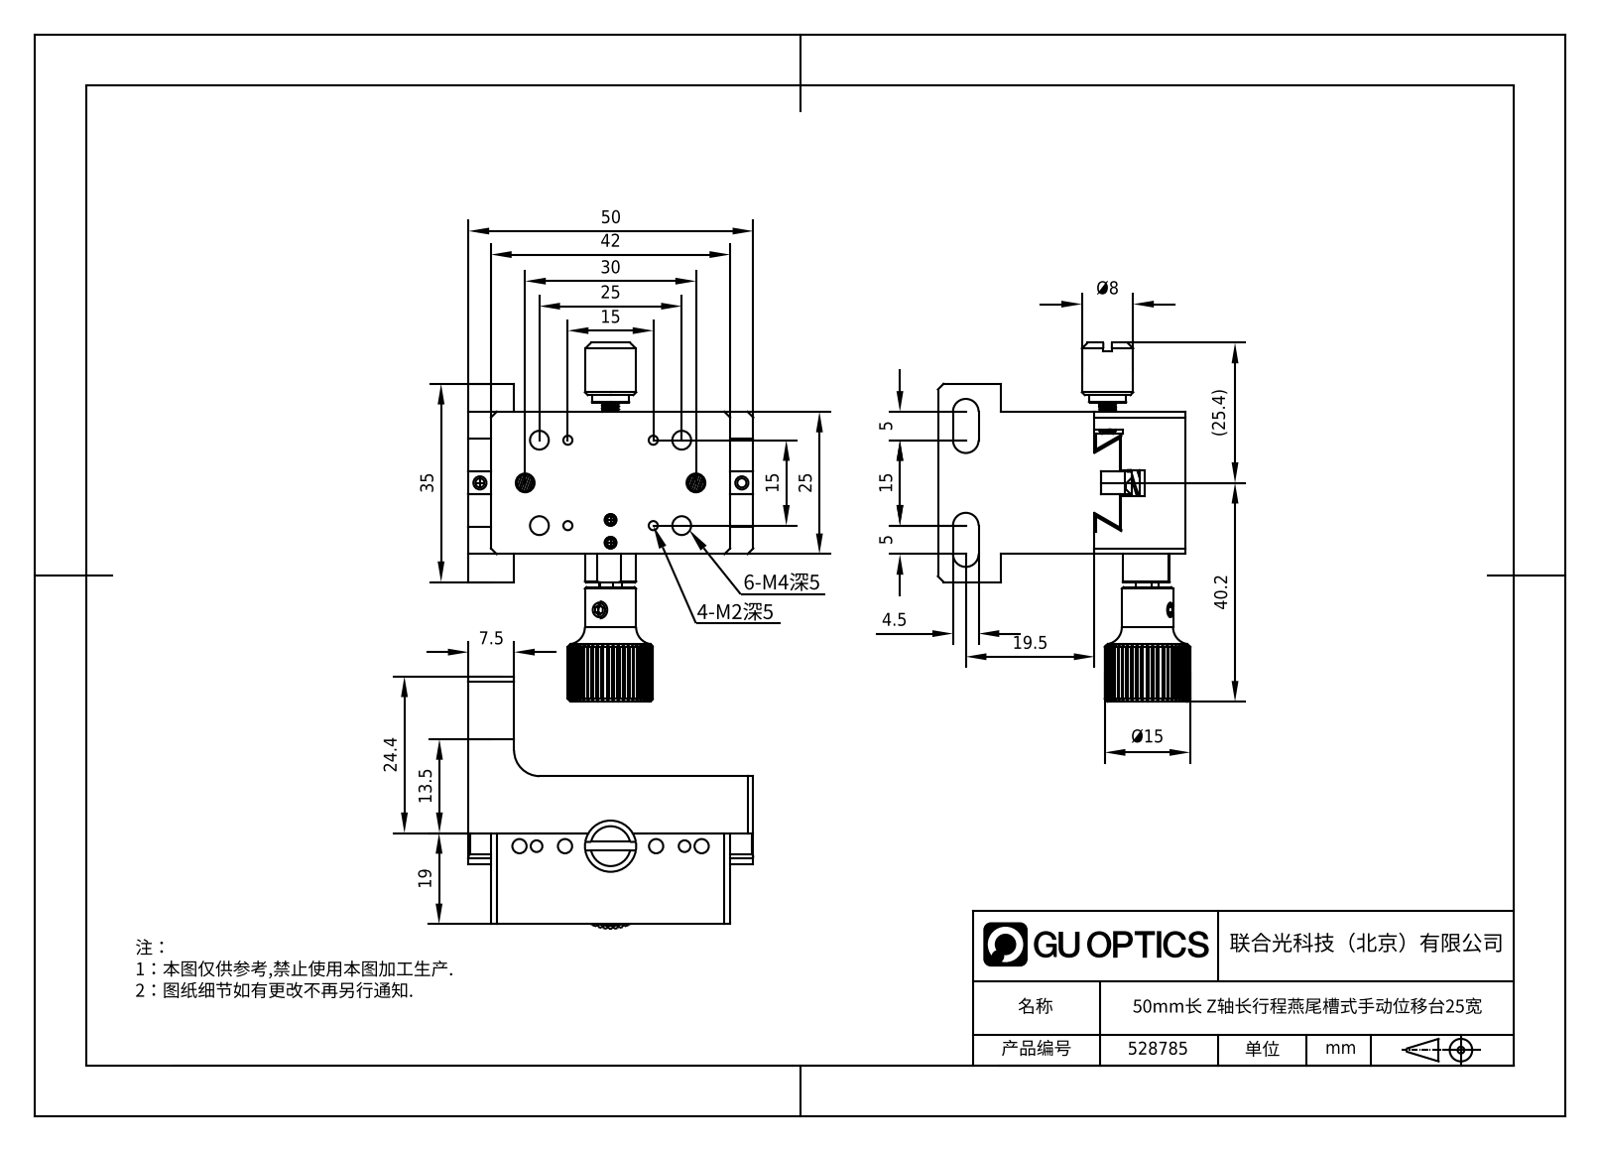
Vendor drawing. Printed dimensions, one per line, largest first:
50
42
40.2
35
30
(25.4)
25
25
24.4
19.5
19
Ø15
15
15
15
13.5
Ø8
7.5
5
5
4.5
